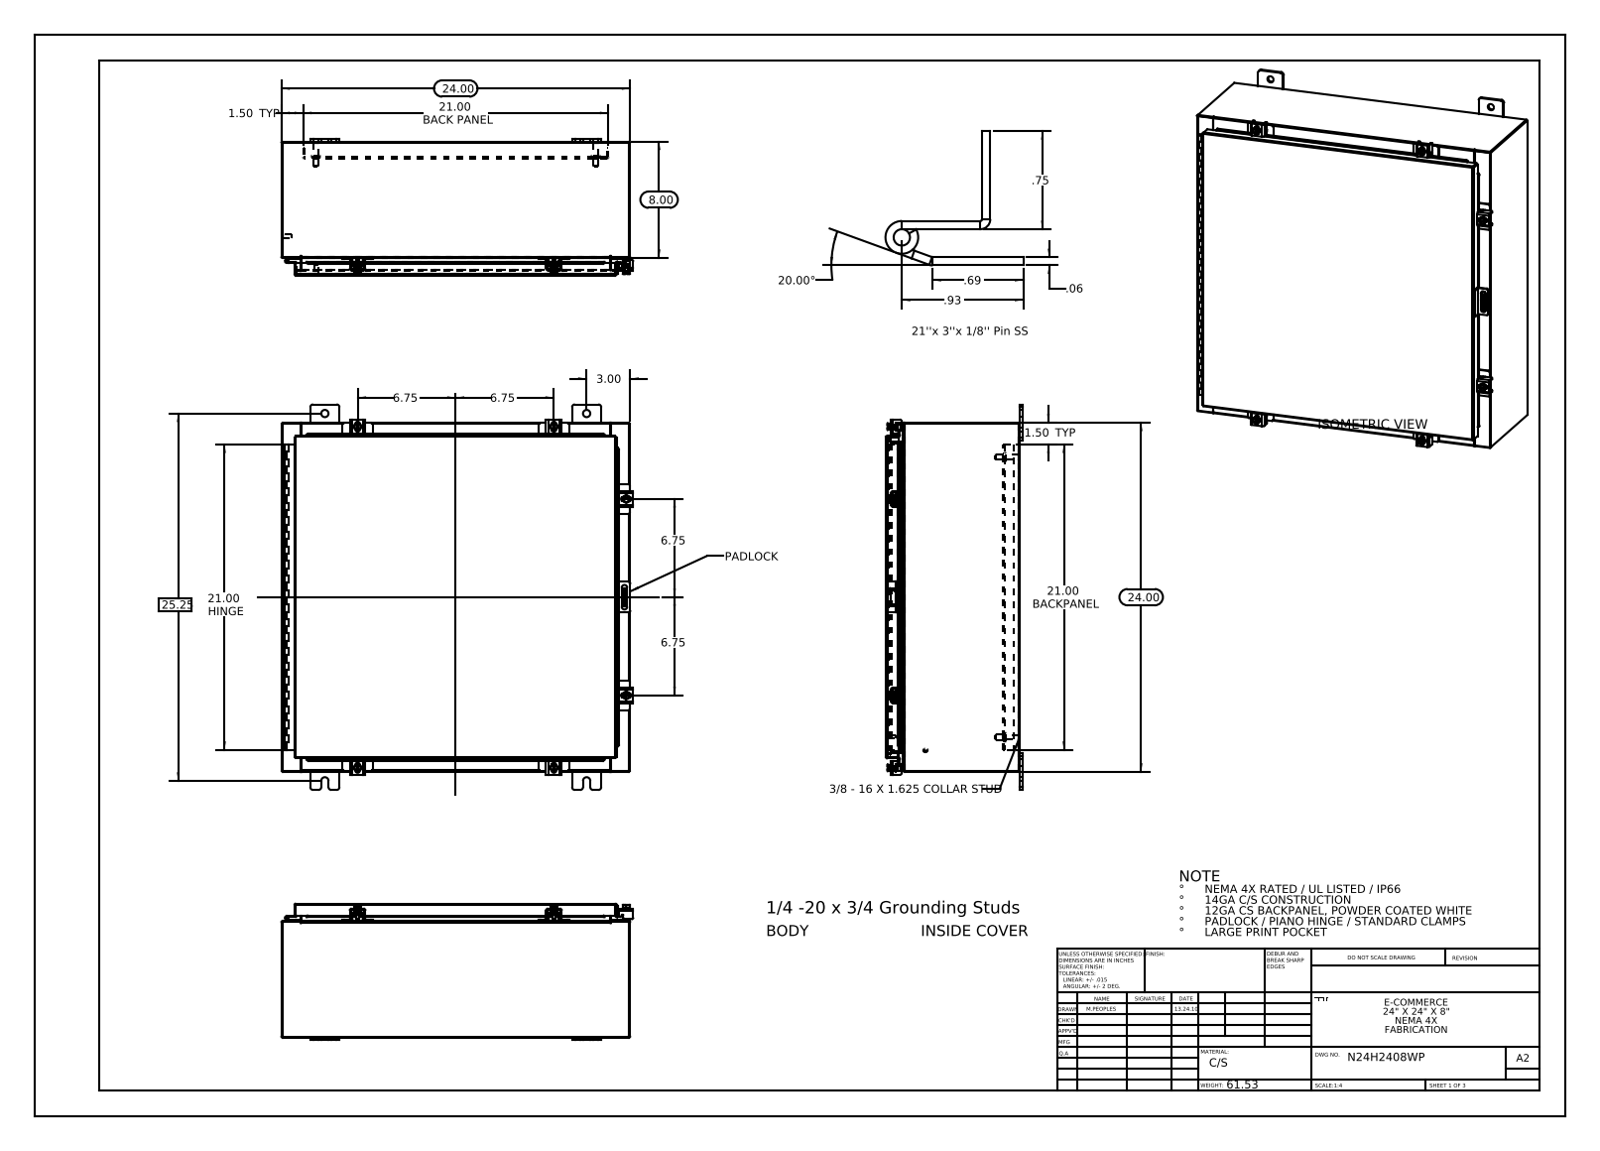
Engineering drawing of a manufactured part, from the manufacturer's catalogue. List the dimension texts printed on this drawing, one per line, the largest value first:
25.25
24.00
24.00
21.00 HINGE
21.00 BACK PANEL
21.00 BACKPANEL
20.00°
8.00
6.75
6.75
6.75
6.75
3.00
1.50 TYP
1.50 TYP
.93
.75
.69
.06
